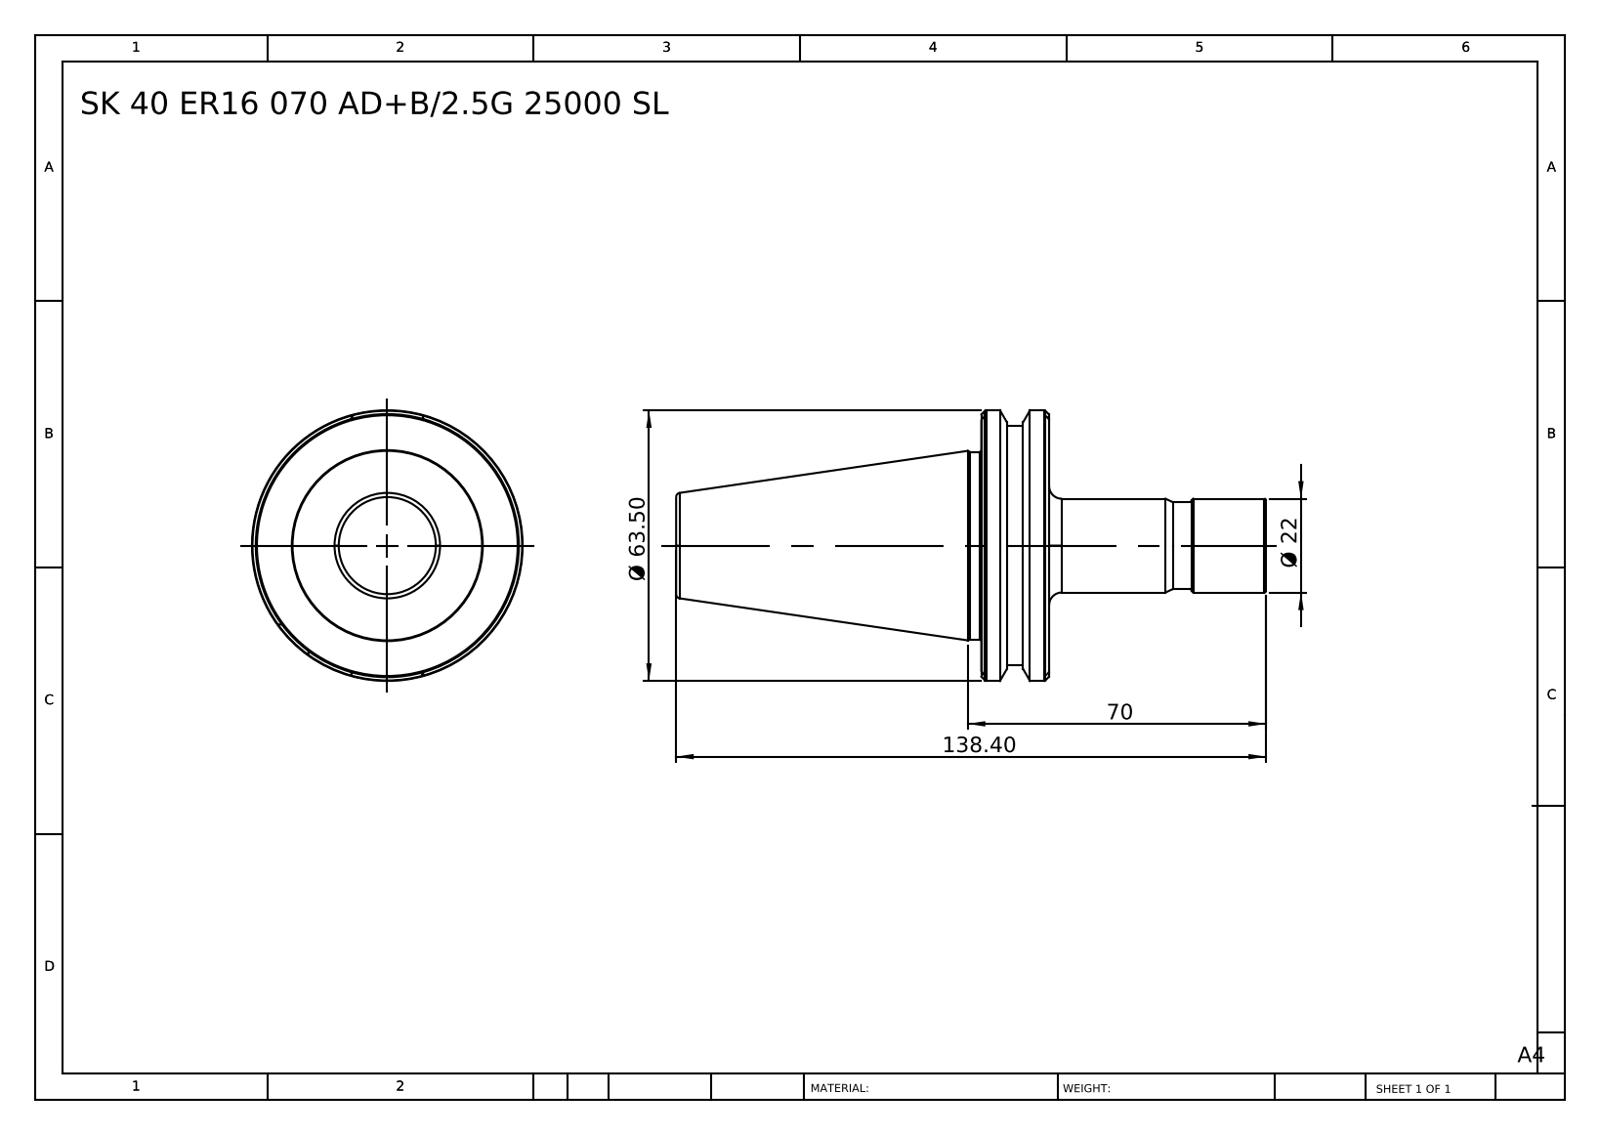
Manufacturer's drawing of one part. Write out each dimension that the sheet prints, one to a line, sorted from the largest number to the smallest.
138.40
70
Ø 63.50
Ø 22
